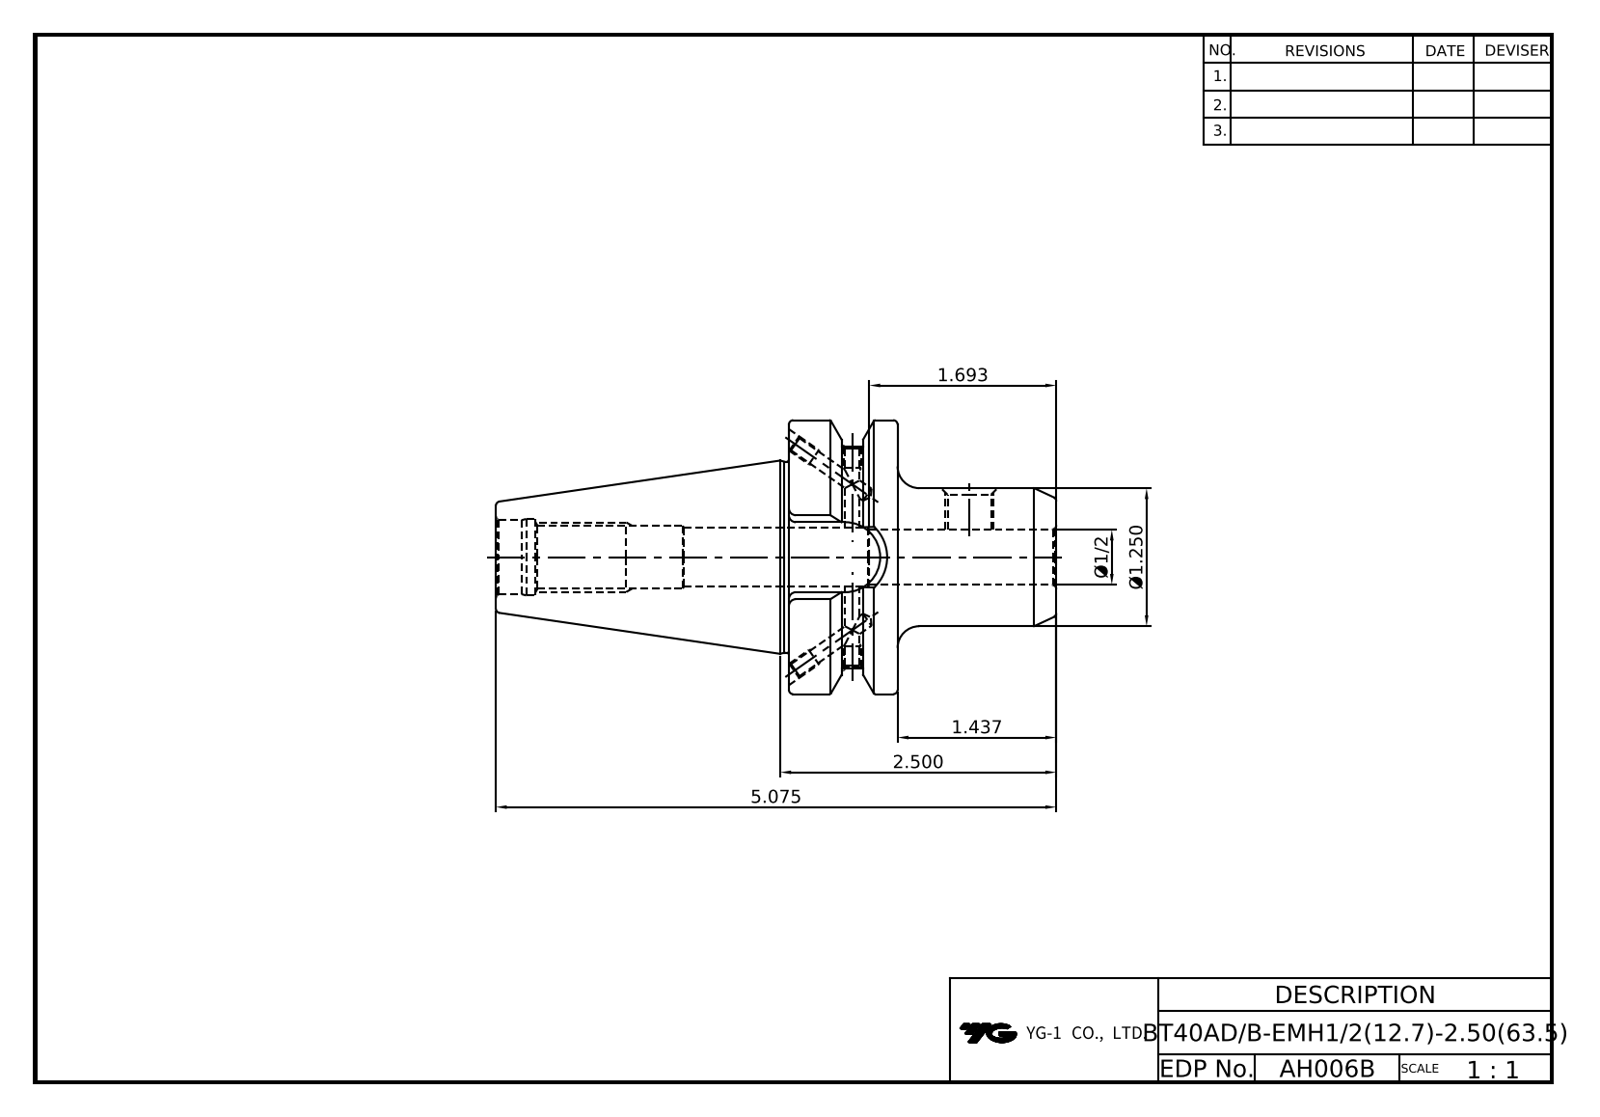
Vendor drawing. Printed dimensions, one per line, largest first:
5.075
2.500
1.693
1.437
Ø1.250
Ø1/2
